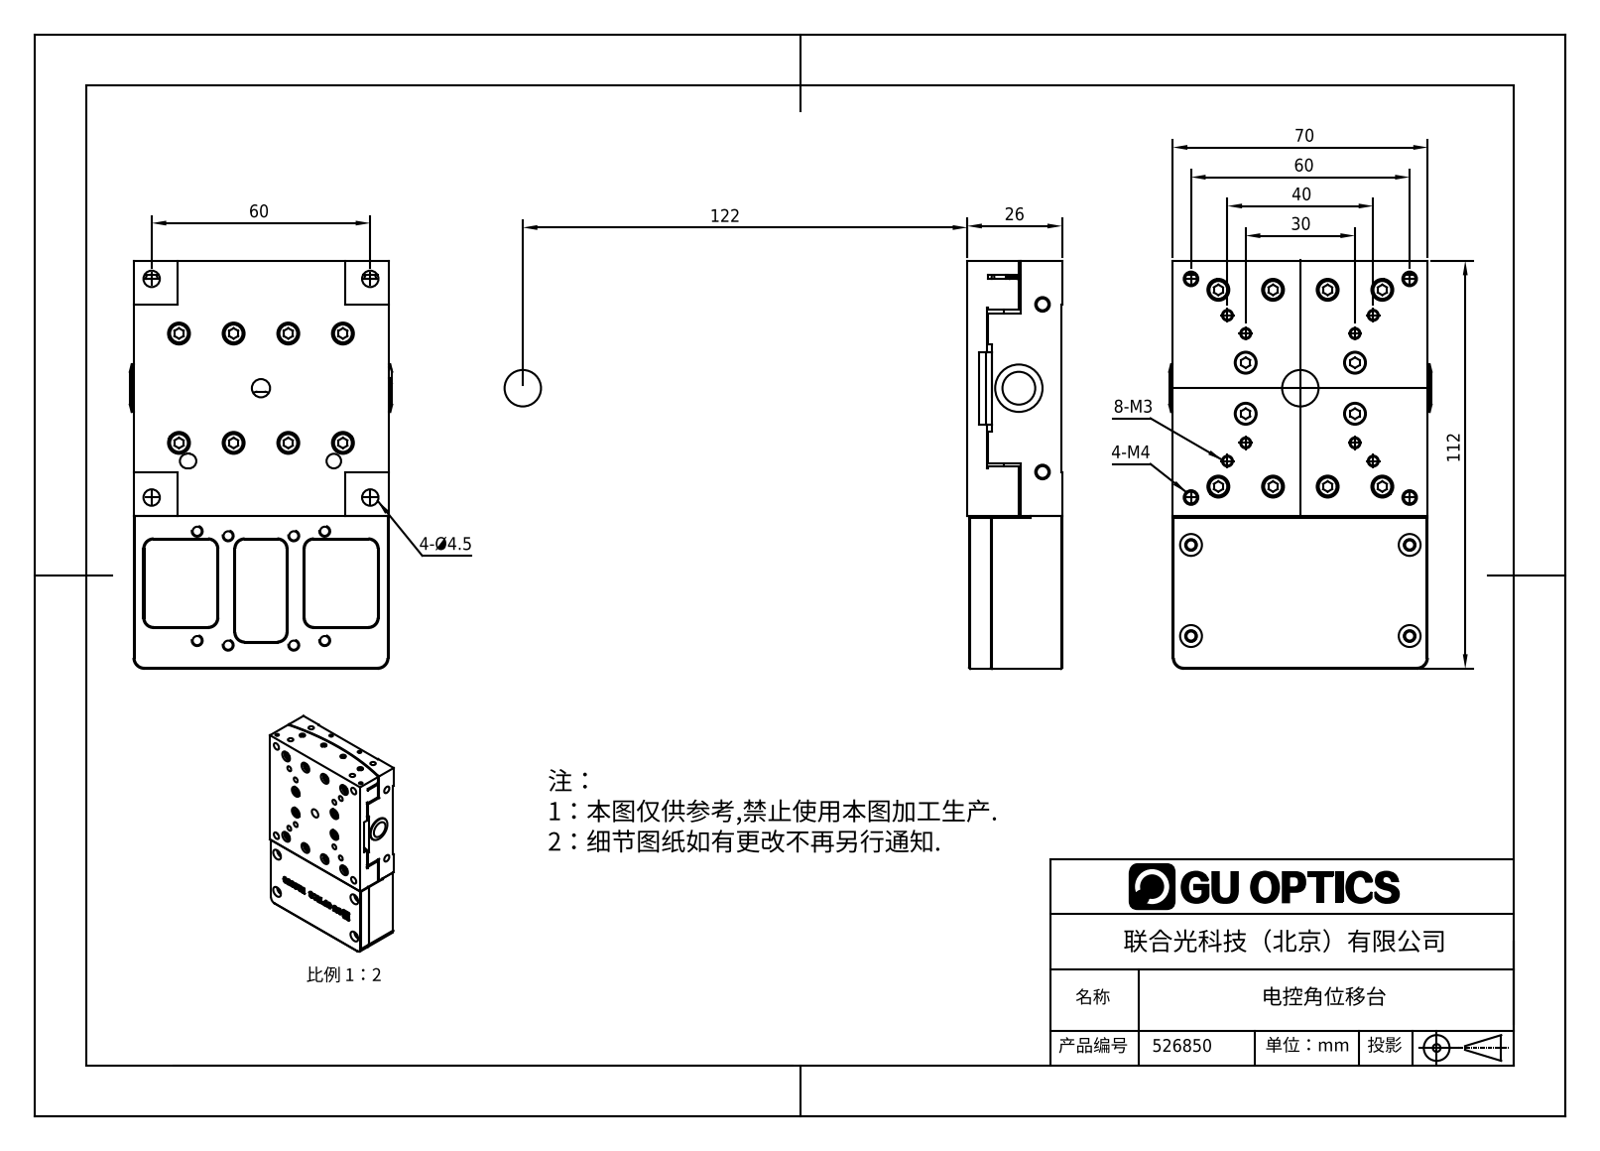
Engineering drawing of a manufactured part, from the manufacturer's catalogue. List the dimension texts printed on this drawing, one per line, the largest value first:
122
112
70
60
60
40
30
26
